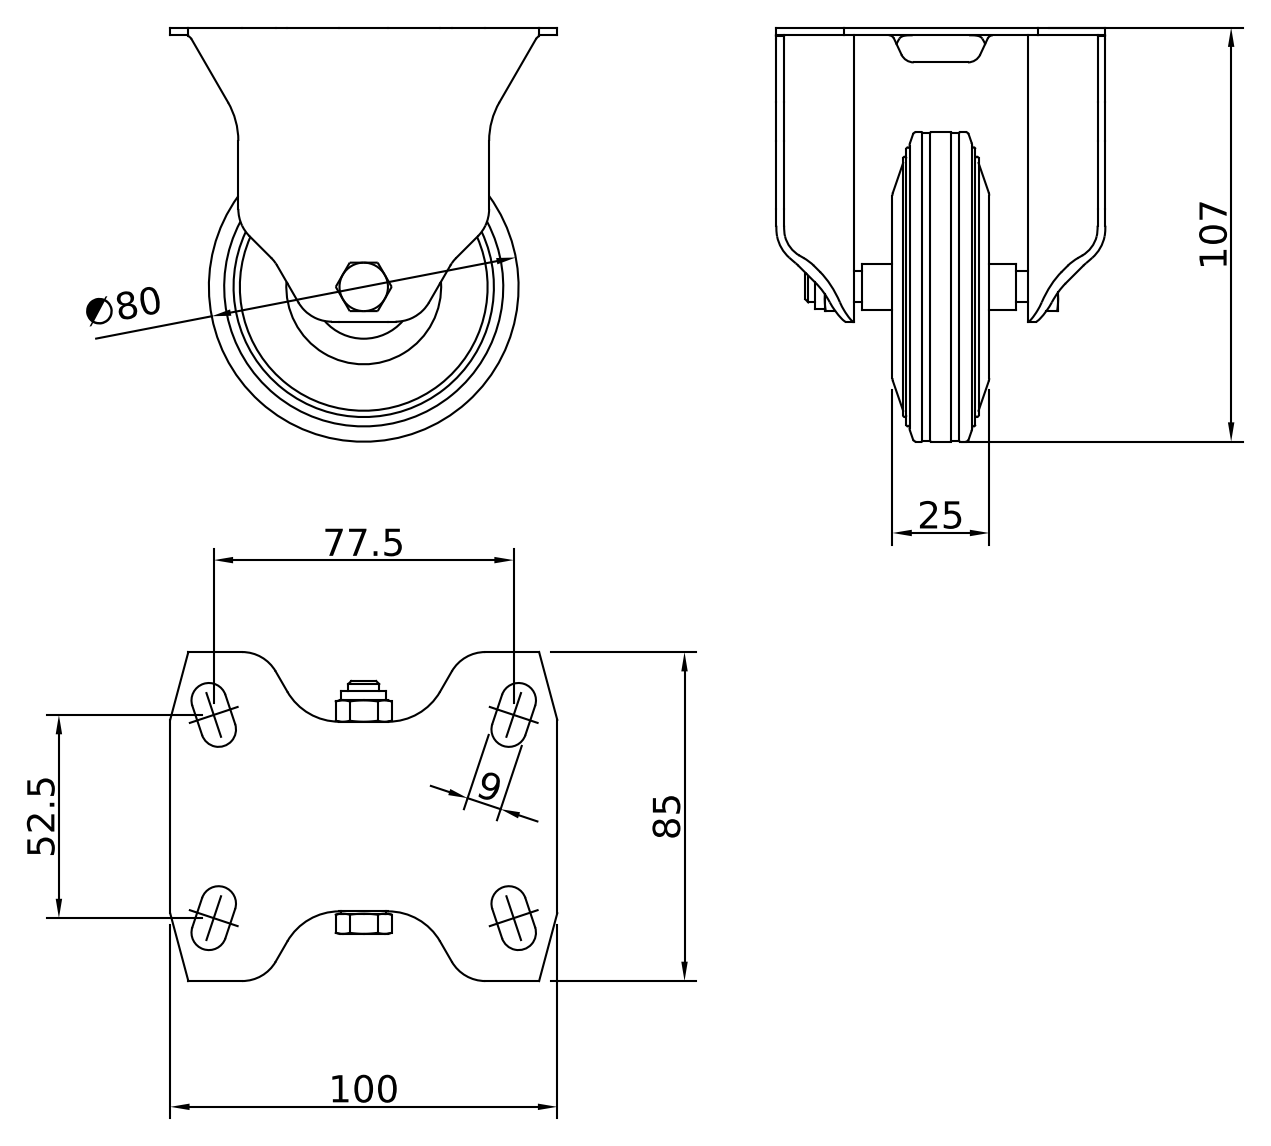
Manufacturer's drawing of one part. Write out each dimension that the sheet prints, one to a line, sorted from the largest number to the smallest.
107
100
85
∅80
77.5
52.5
25
9
